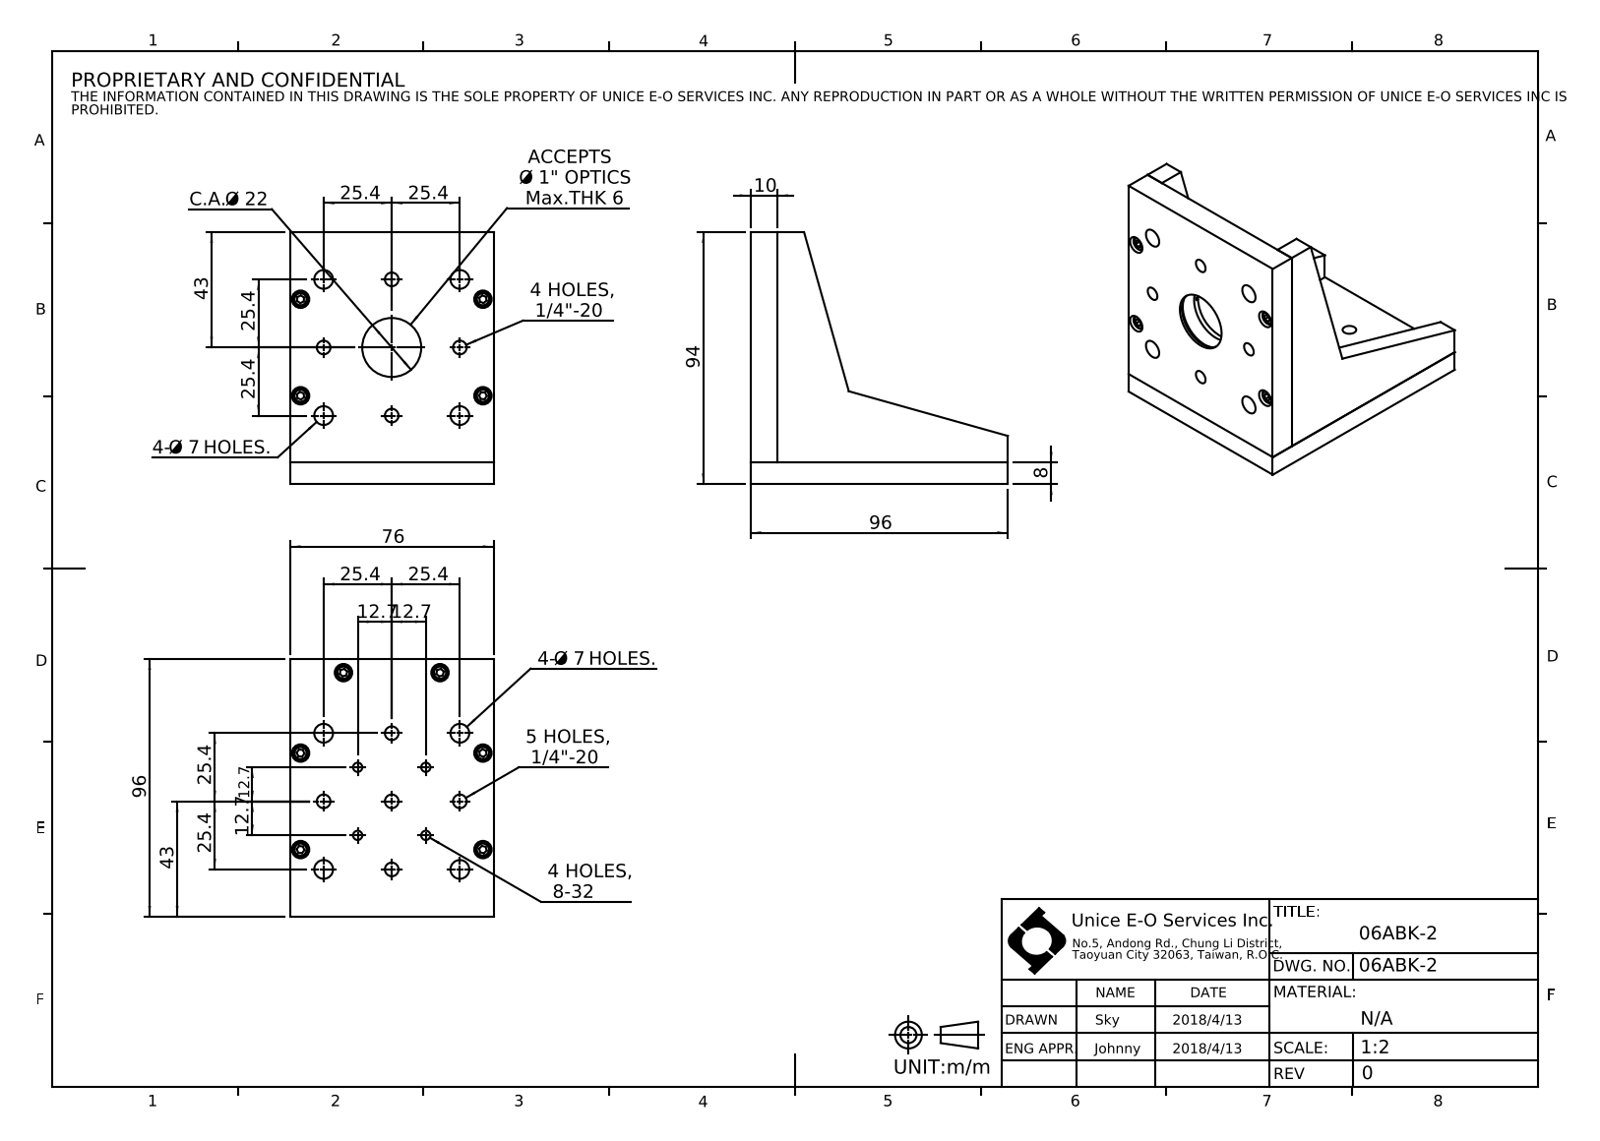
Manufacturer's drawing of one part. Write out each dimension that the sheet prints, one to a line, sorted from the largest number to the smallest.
96
96
94
76
43
43
25.4
25.4
25.4
25.4
25.4
25.4
25.4
25.4
C.A. Ø 22
12.7
12.7
12.7
12.7
10
8
4- Ø 7 HOLES.
4- Ø 7 HOLES.
5 HOLES, 1/4"-20
4 HOLES, 1/4"-20
4 HOLES, 8-32
ACCEPTS Ø 1" OPTICS Max.THK 6
